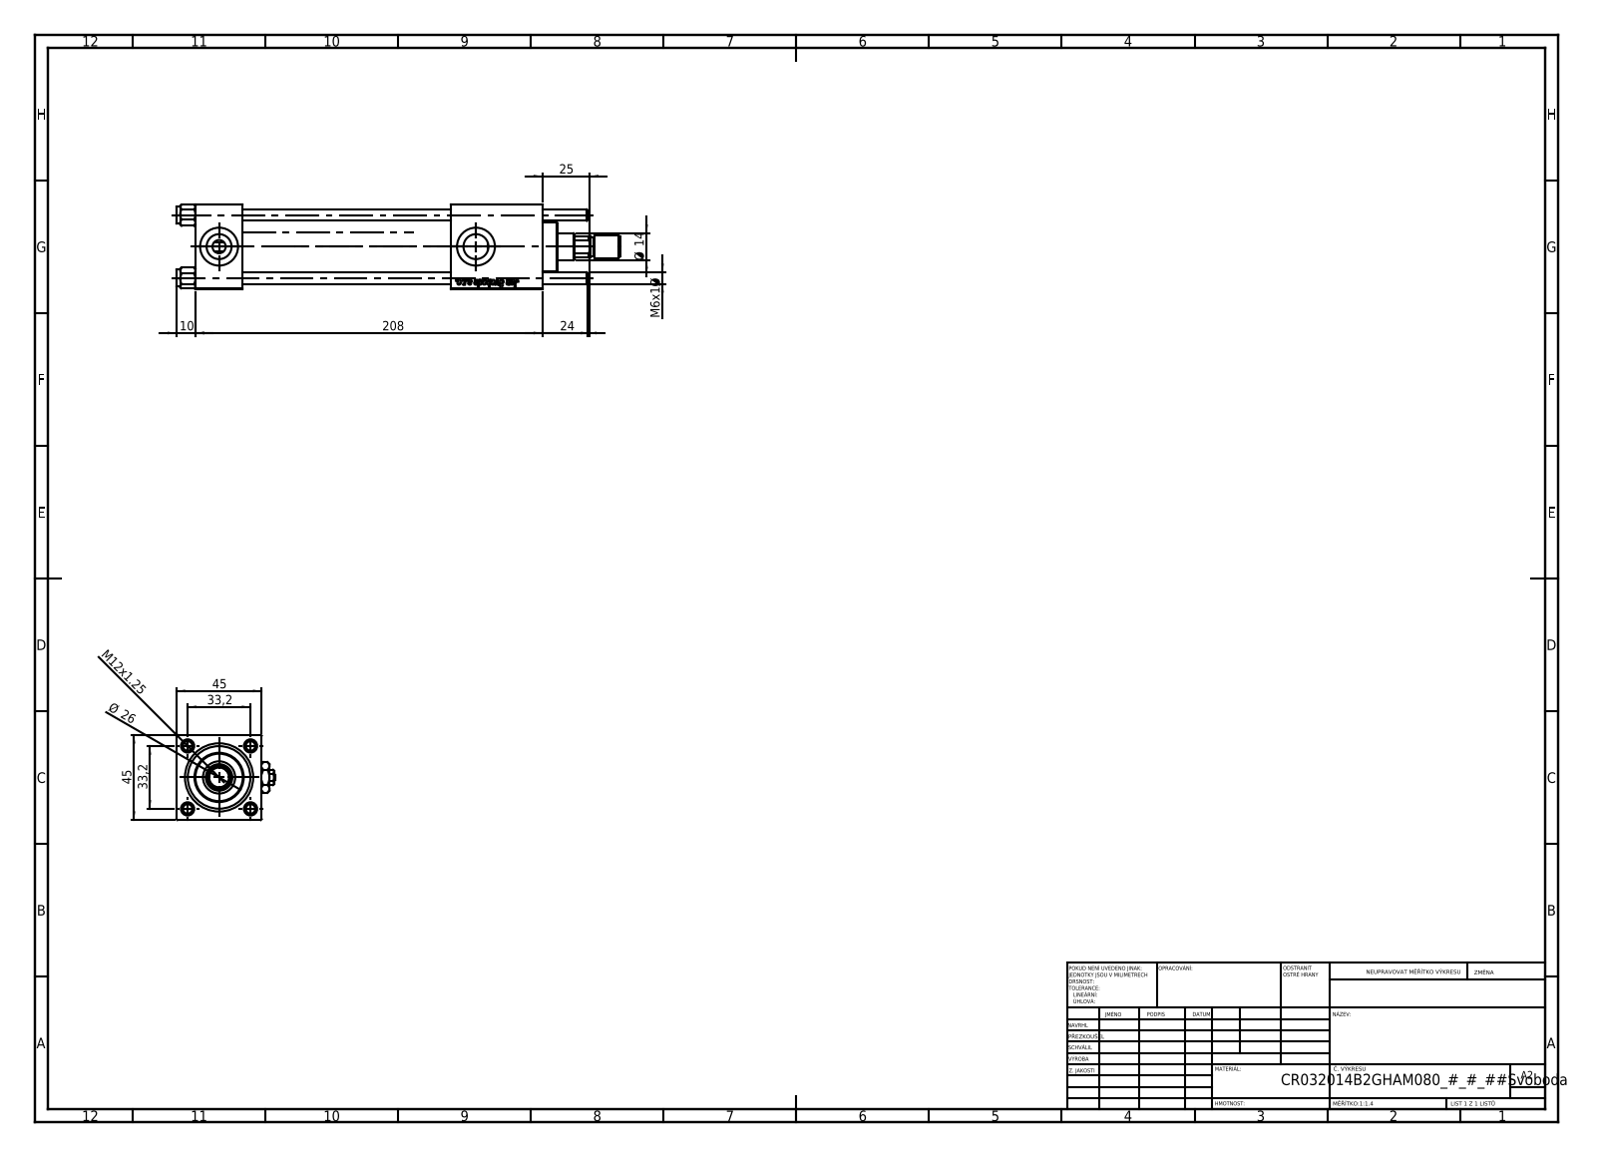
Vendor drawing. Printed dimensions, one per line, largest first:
208
45
45
33,2
33,2
Ø 26
25
24
Ø 14
M12x1.25
10
M6x1 Ø
